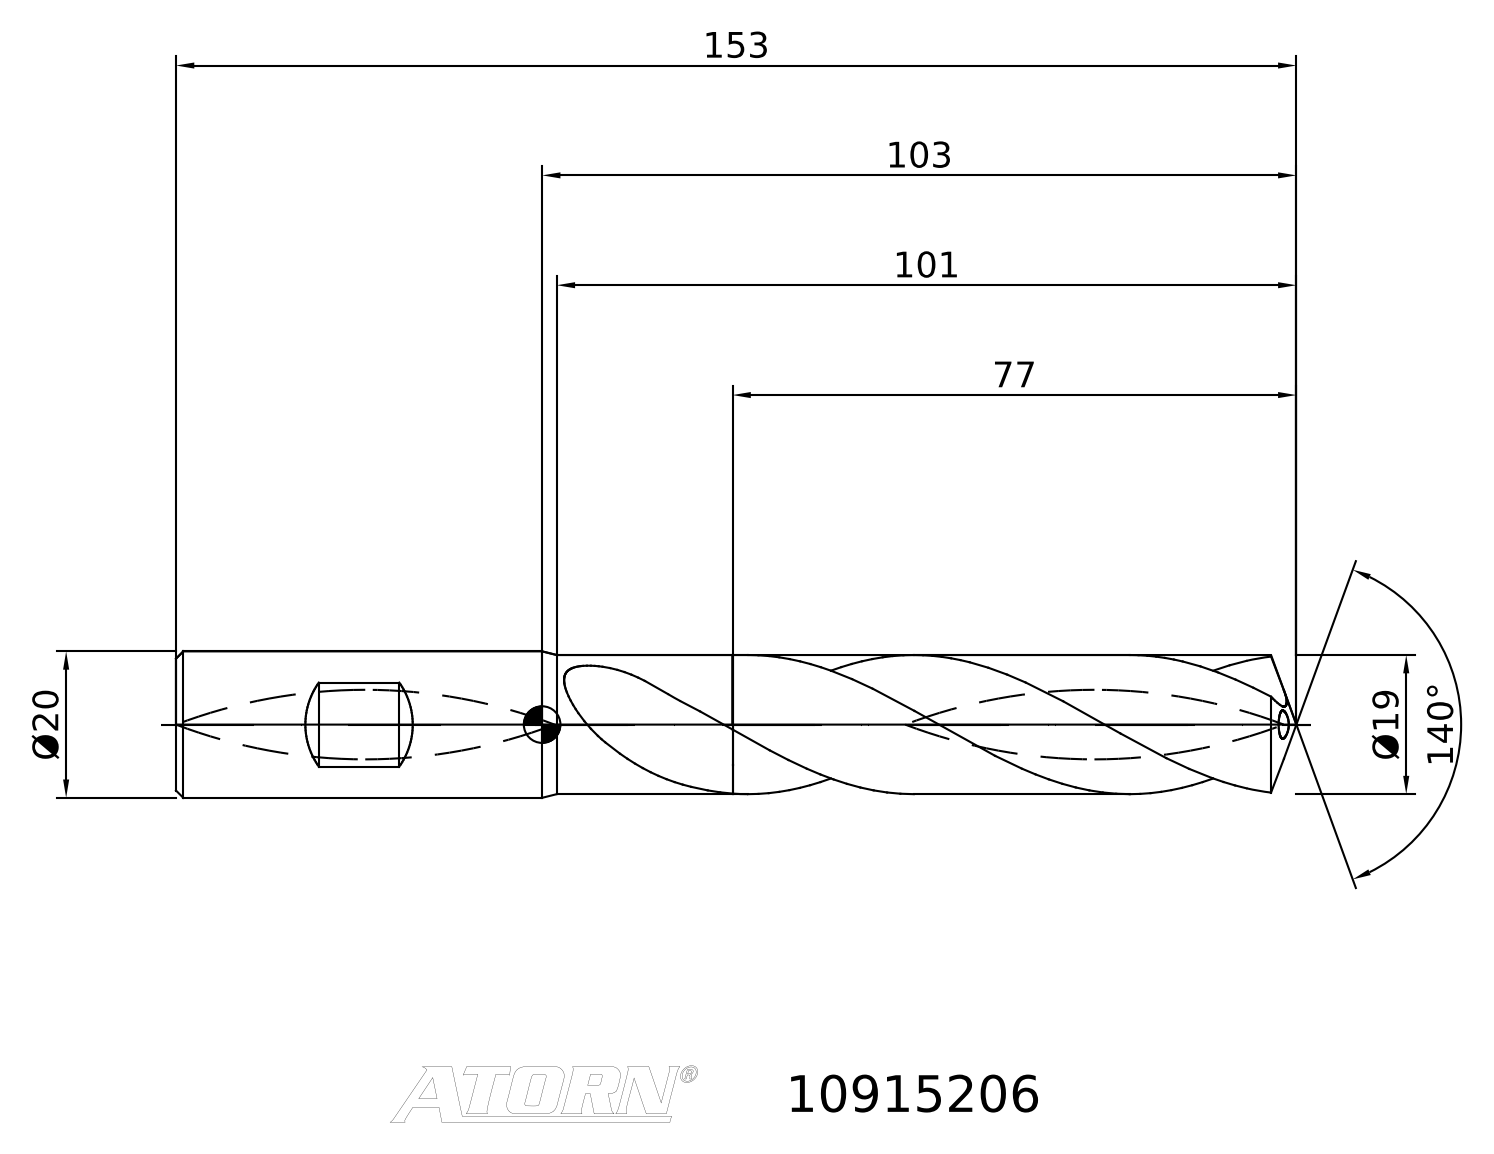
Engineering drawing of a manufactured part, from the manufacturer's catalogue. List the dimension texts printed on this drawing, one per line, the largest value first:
153
140°
103
101
77
Ø20
Ø19
